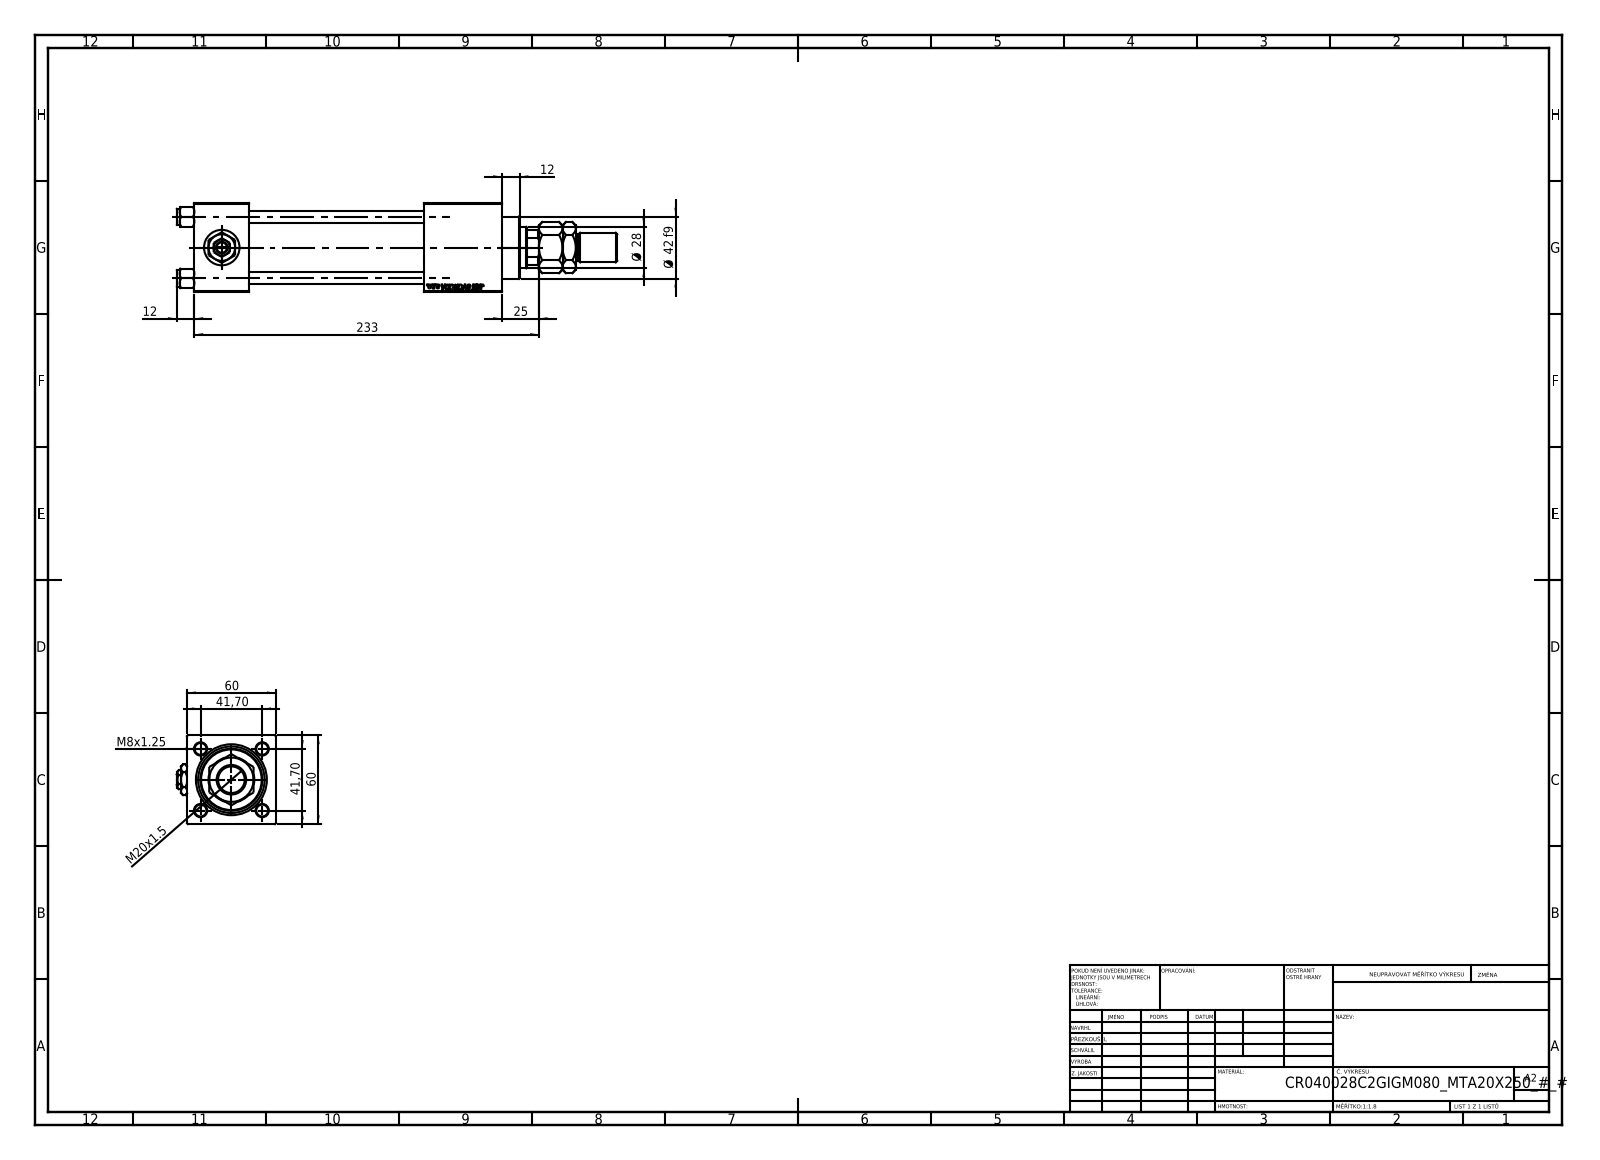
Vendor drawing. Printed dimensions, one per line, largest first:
233
60
60
Ø 42 f9
41,70
41,70
Ø 28
25
M20x1.5
12
12
M8x1.25
